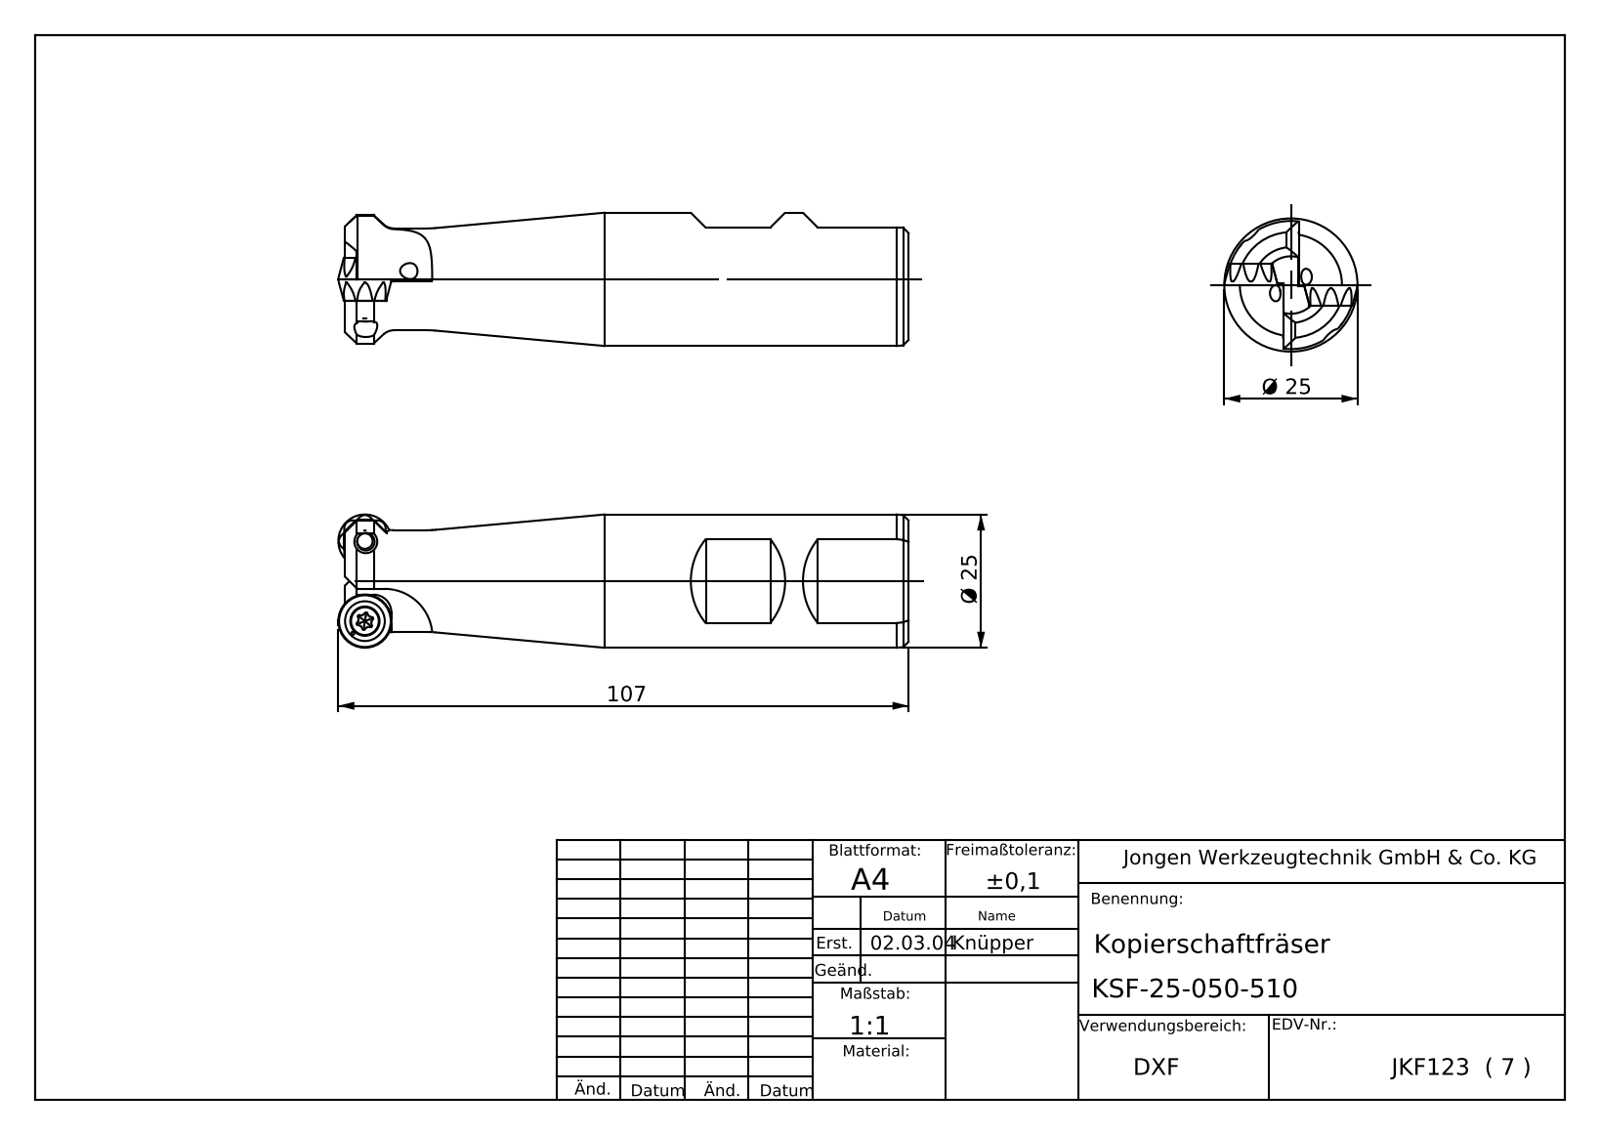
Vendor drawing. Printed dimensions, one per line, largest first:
107
Ø 25
Ø 25
